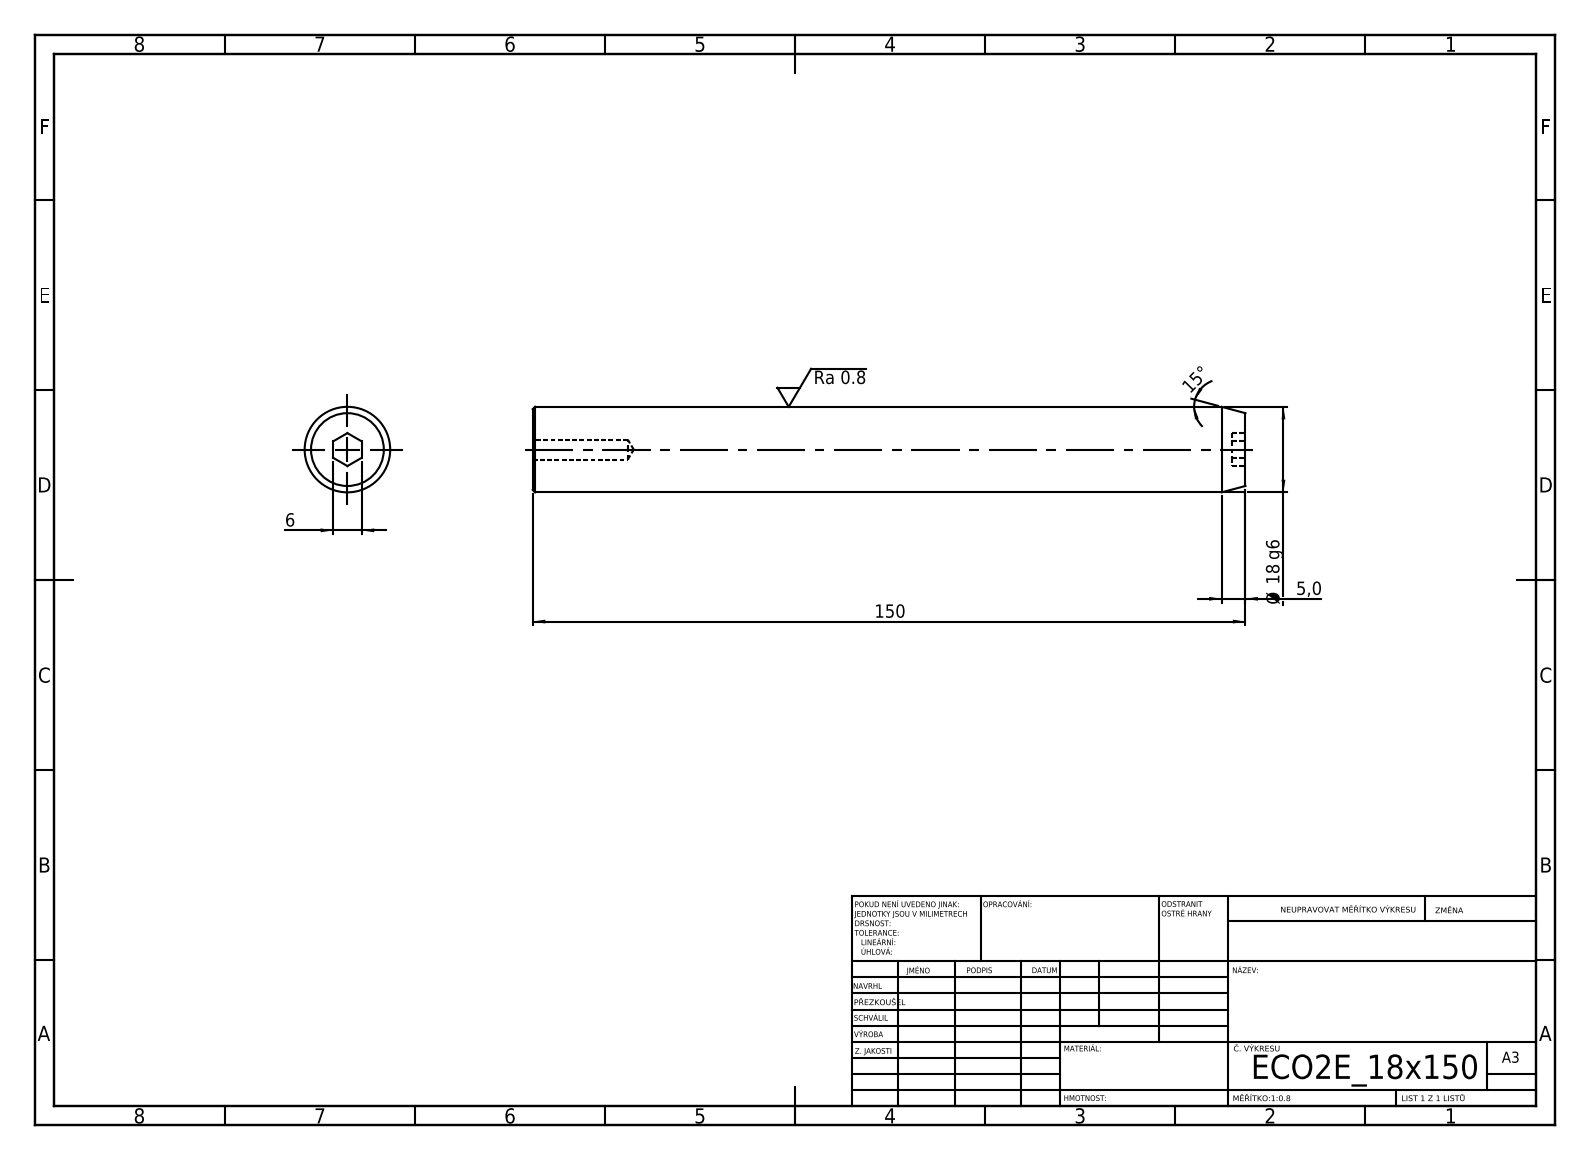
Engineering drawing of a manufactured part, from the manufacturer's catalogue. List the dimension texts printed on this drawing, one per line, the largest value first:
150
Ø 18 g6
15°
6
5,0
